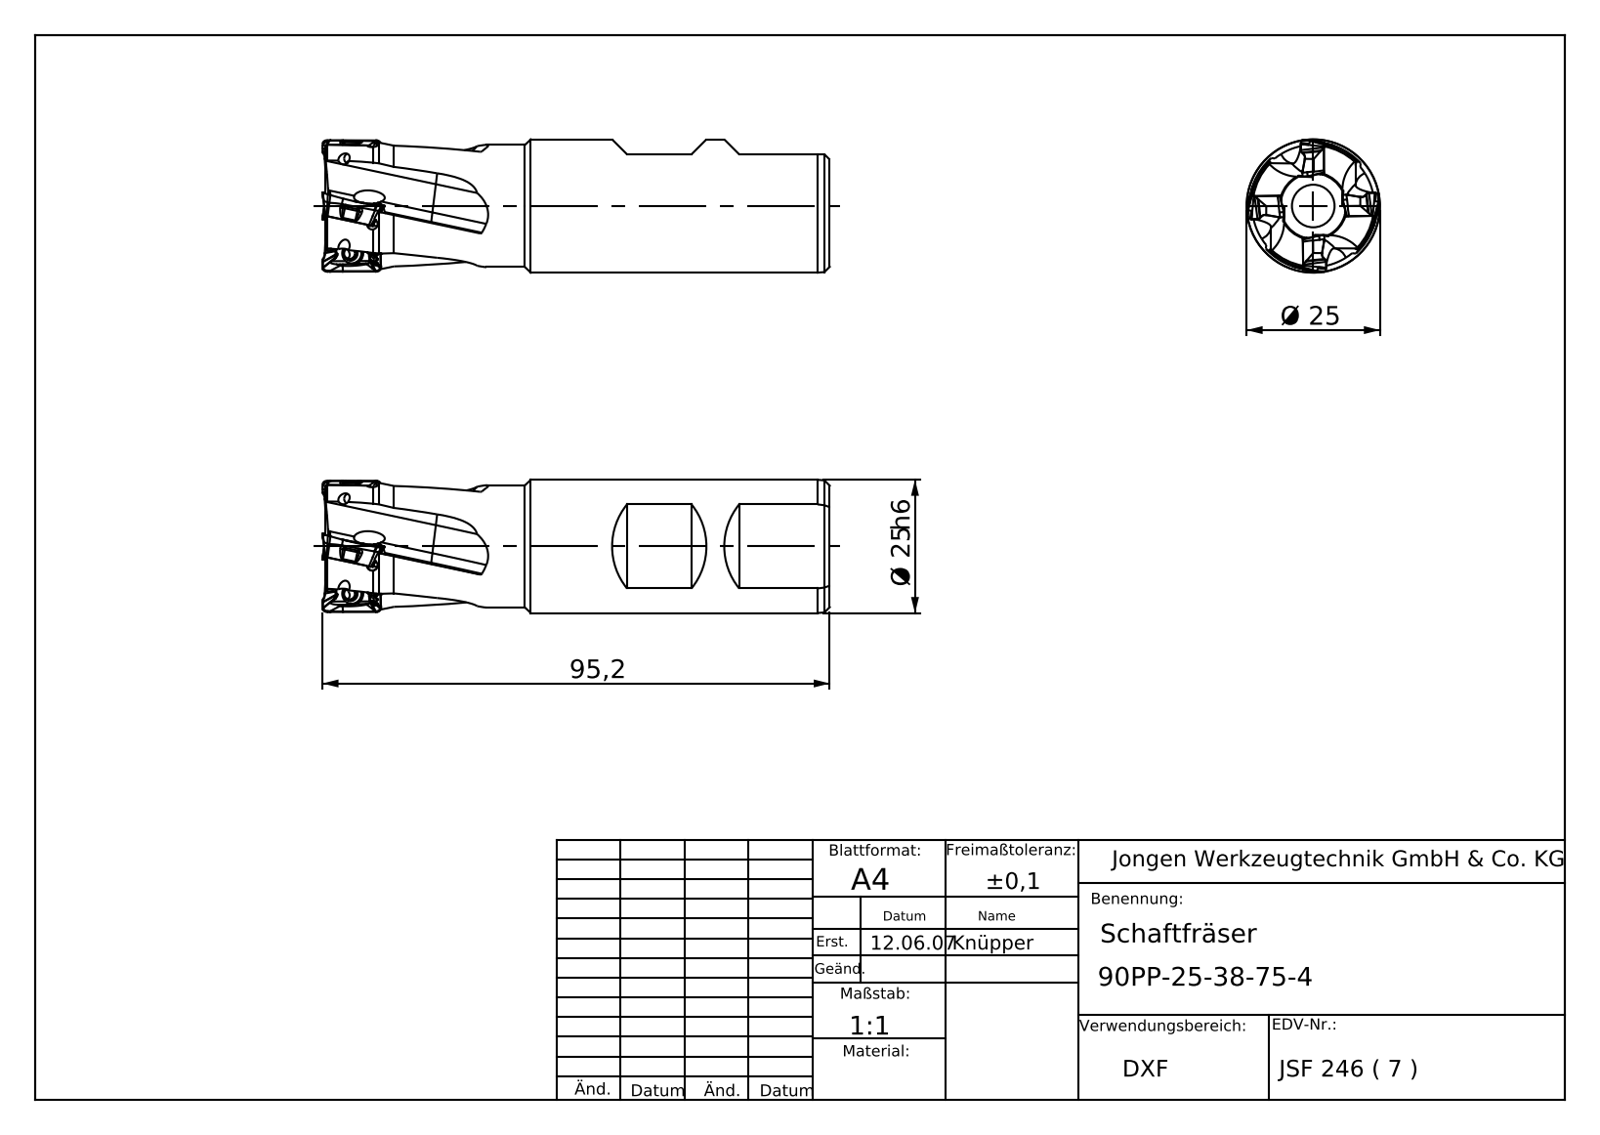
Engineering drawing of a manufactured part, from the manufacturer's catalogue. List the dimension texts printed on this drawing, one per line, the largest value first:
95,2
Ø 25
Ø 25 h6
